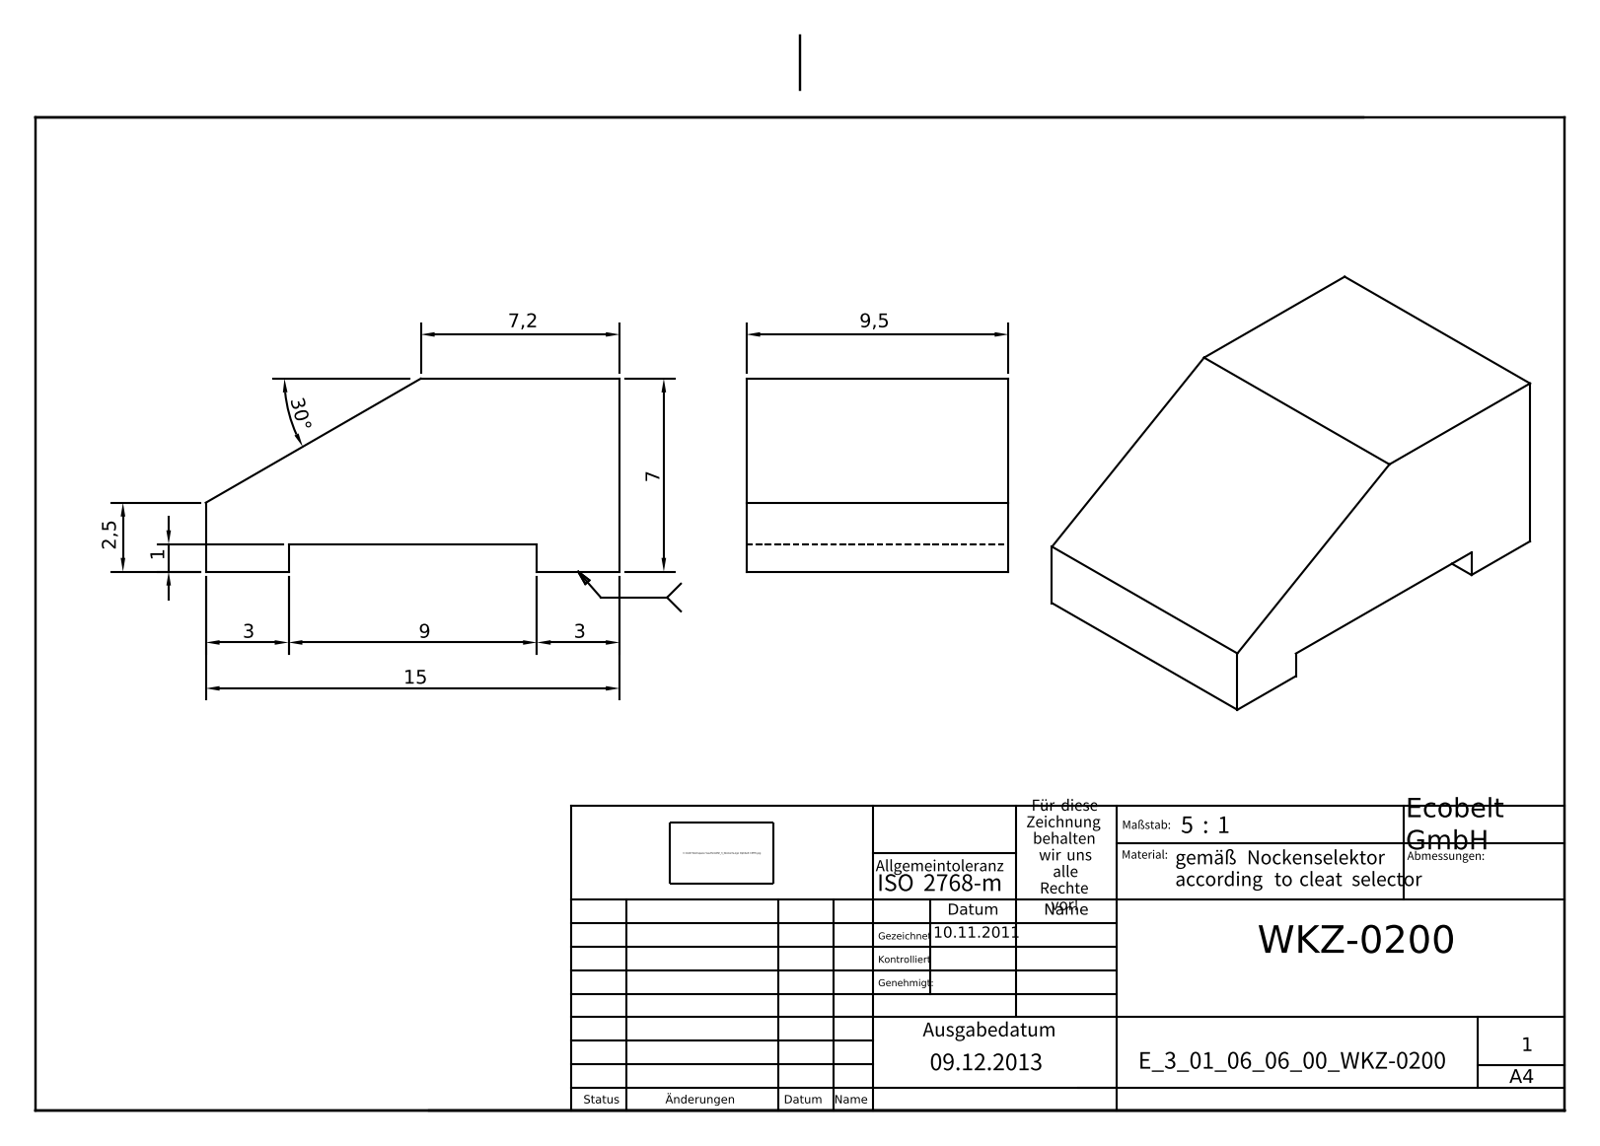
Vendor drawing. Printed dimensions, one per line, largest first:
30°
15
9,5
9
7,2
7
3
3
2,5
1
